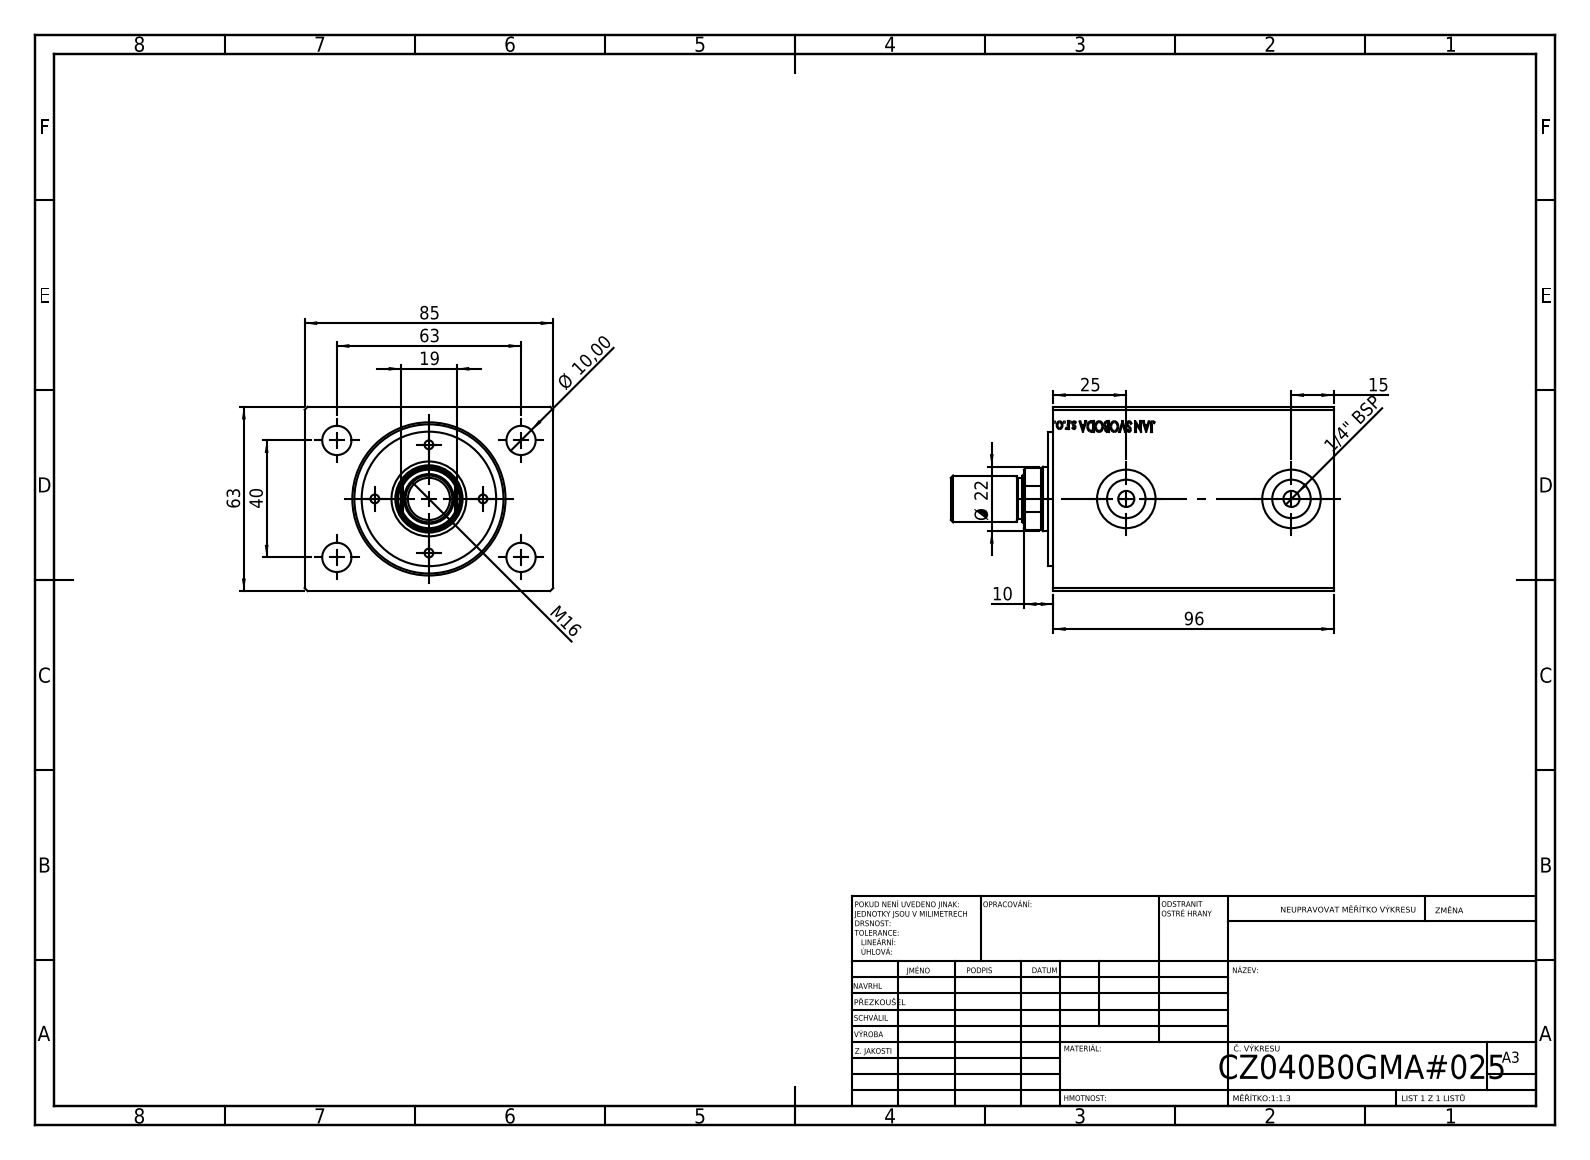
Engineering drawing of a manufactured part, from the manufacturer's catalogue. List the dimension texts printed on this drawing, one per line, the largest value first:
96
85
63
63
40
25
Ø 22
19
M16
15
Ø 10,00
10
1/4" BSP
